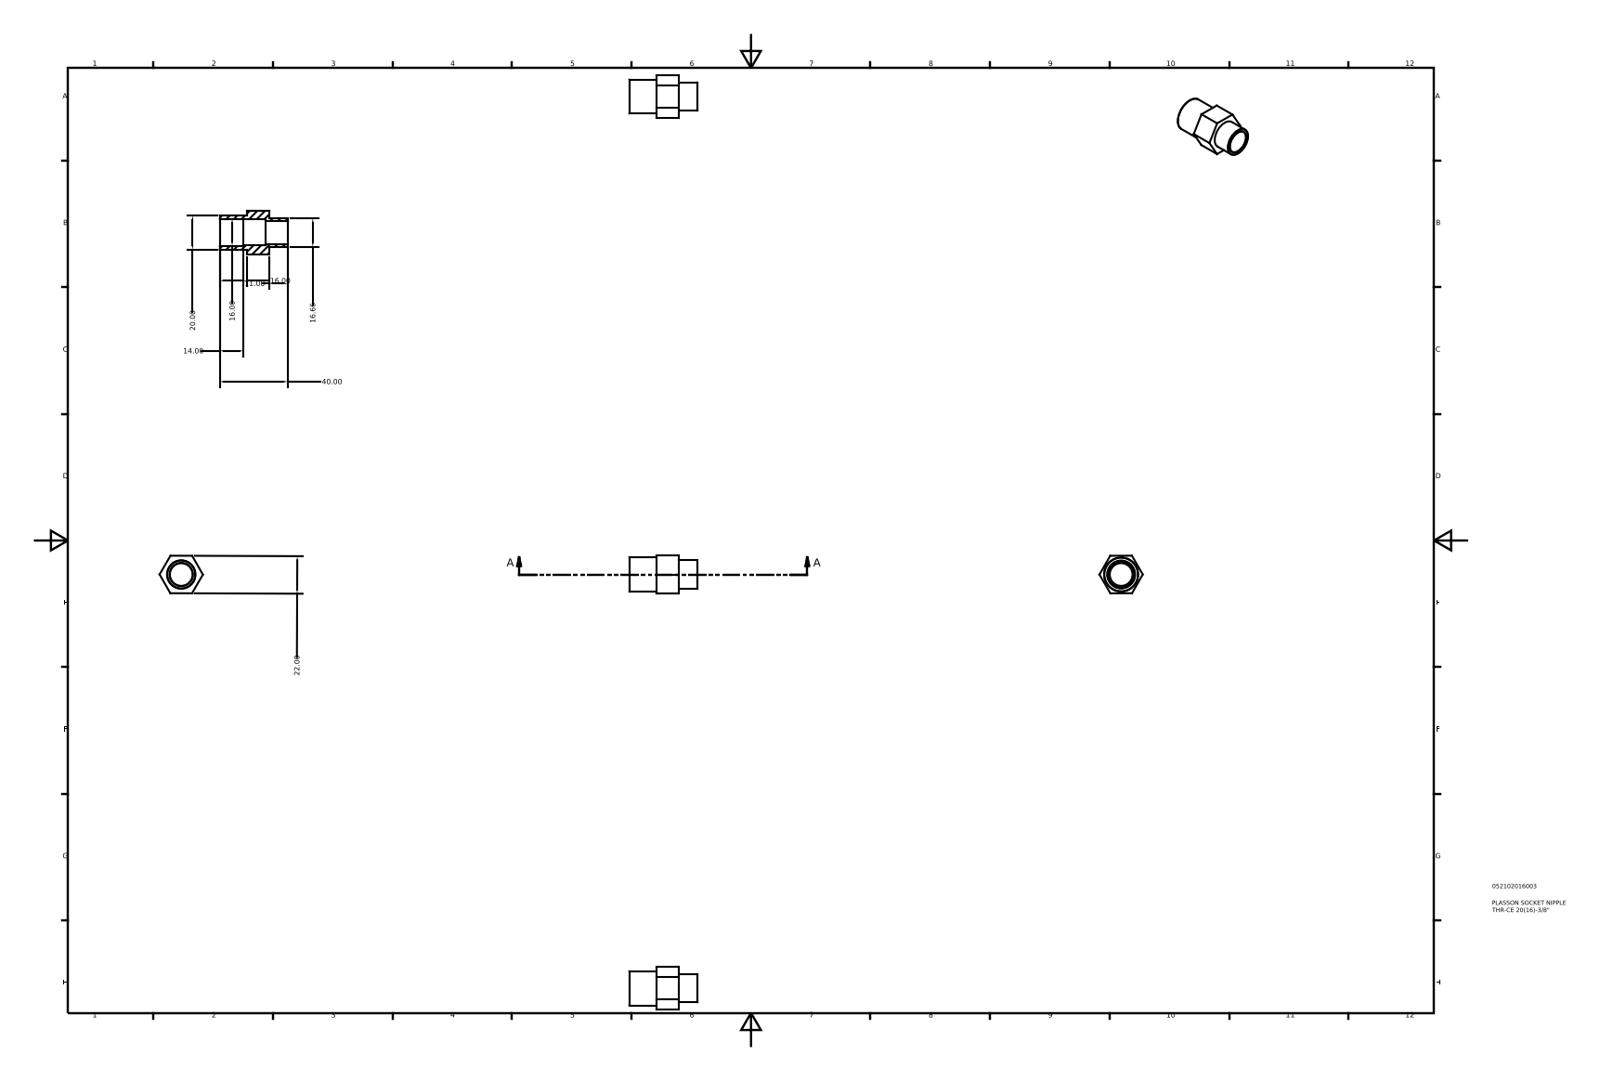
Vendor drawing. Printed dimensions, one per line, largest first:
40.00
22.00
20.00
16.66
16.00
16.00
14.00
11.00
